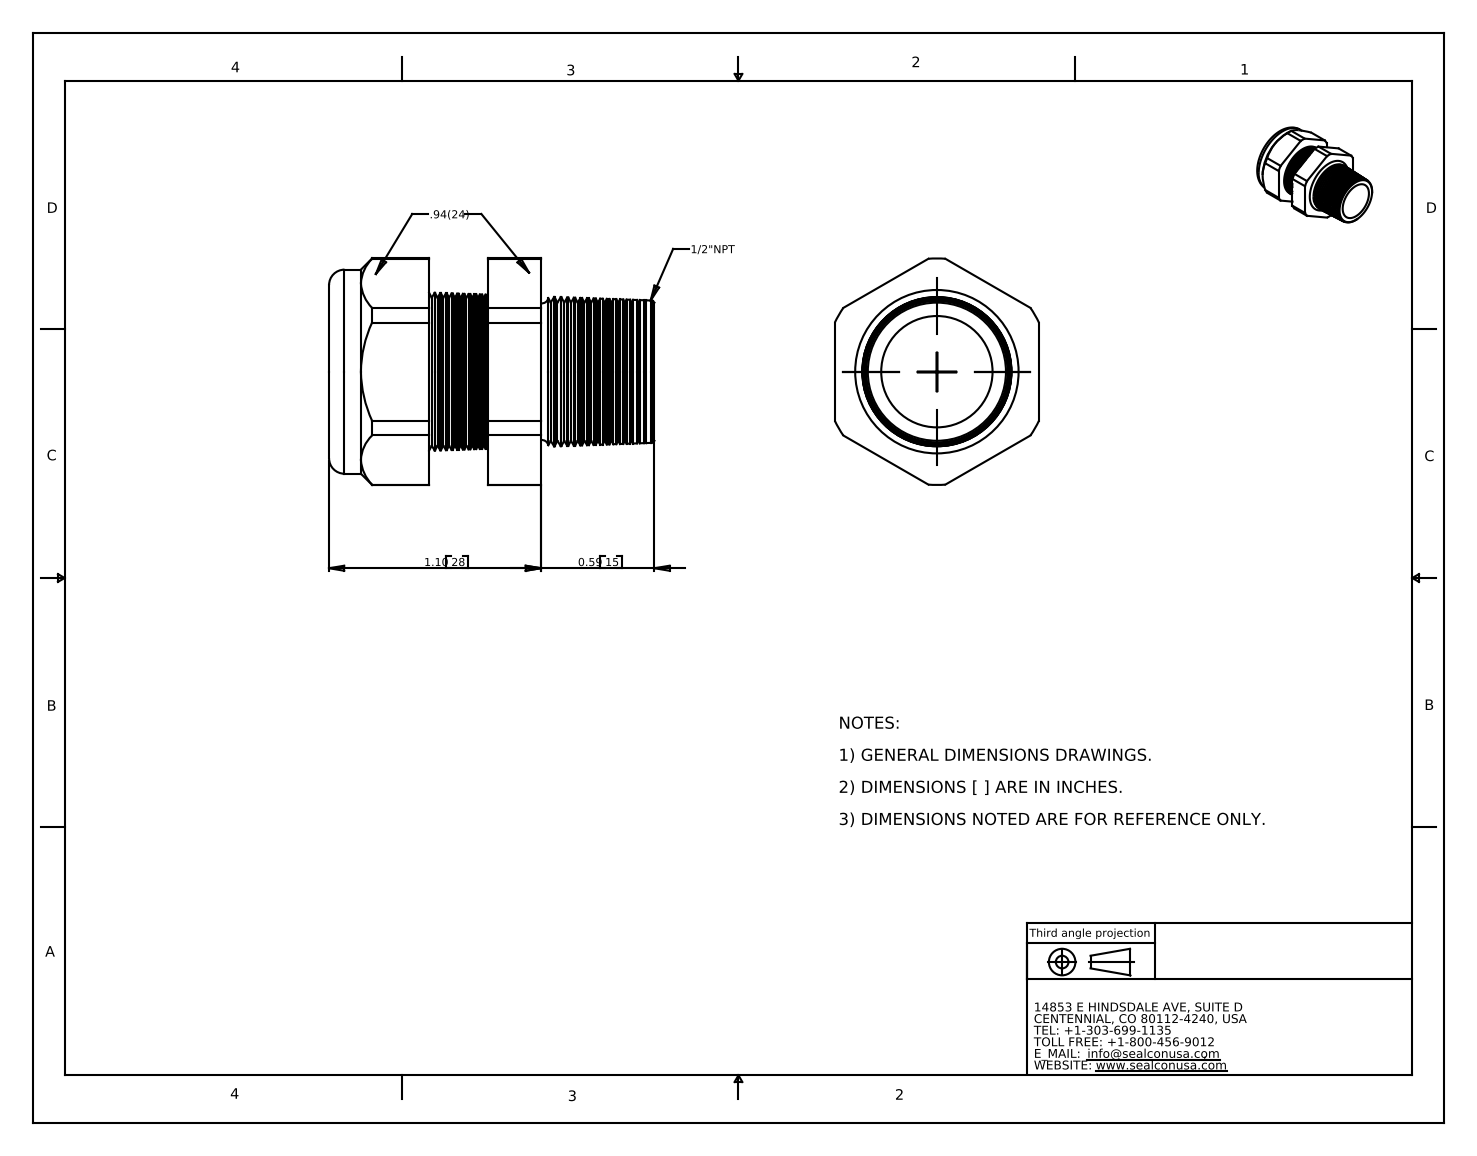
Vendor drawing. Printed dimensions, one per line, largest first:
1.10 28
0.59 15
